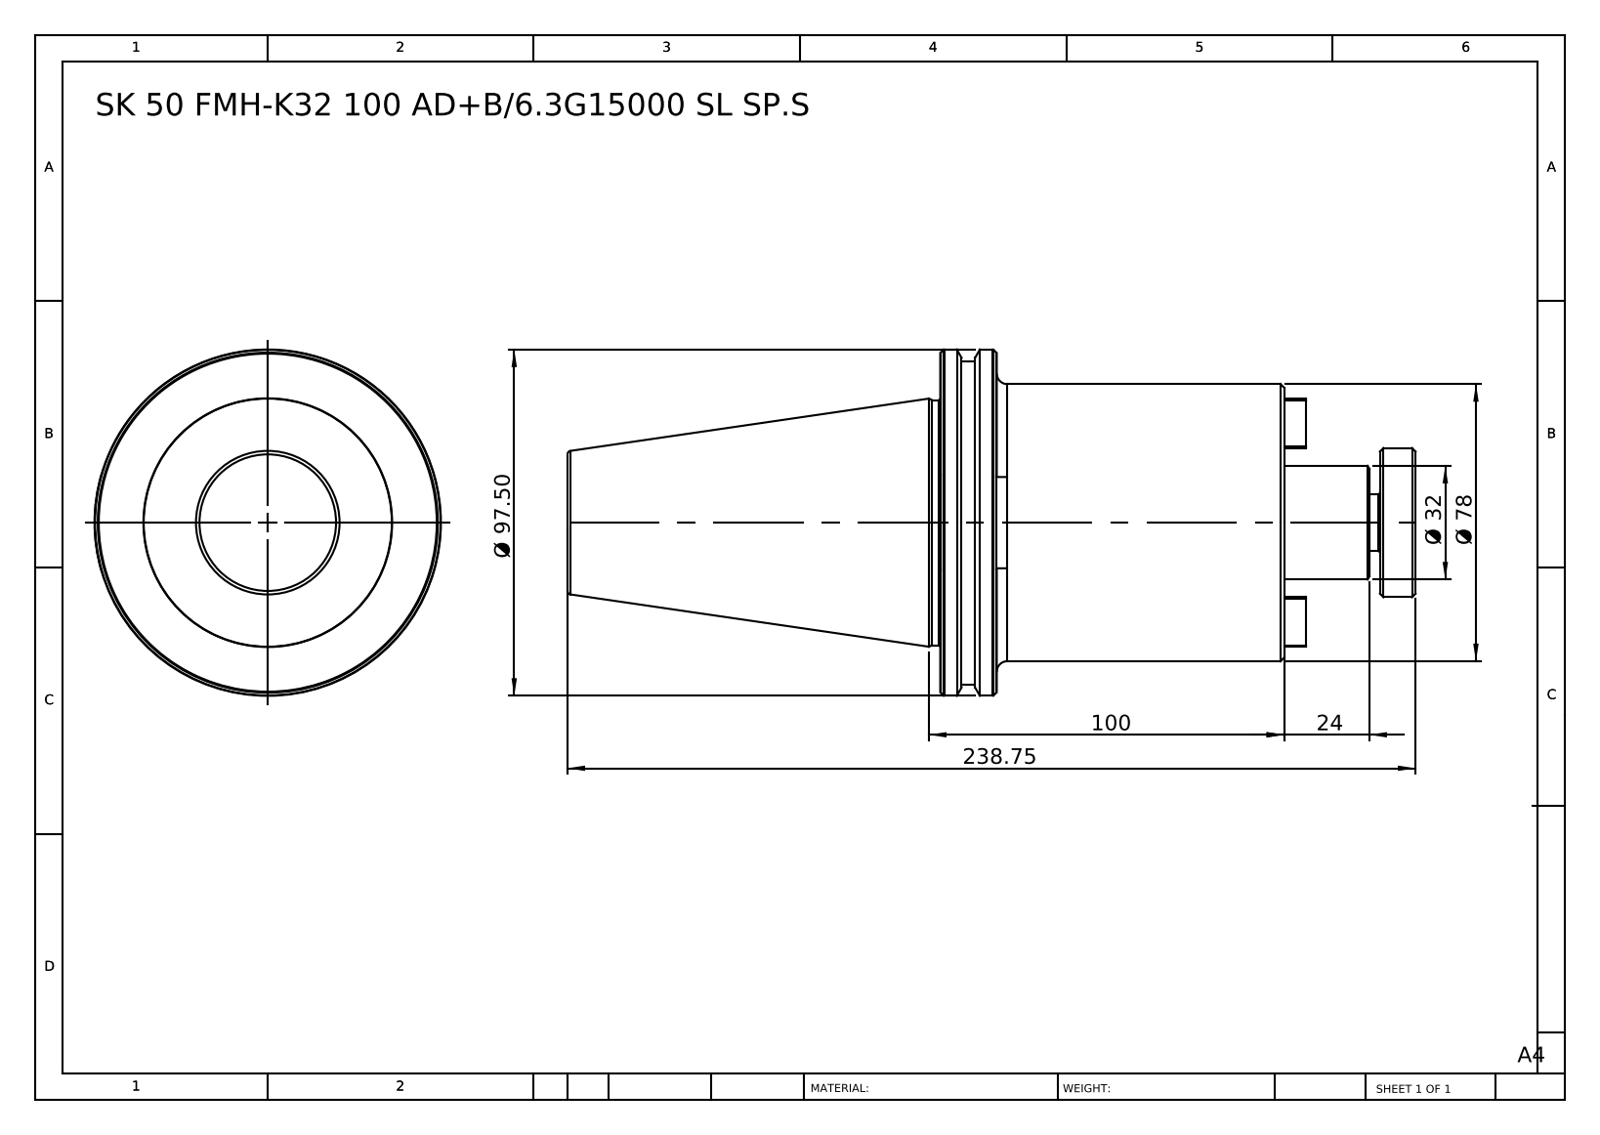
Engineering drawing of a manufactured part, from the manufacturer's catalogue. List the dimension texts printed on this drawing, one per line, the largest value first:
238.75
100
Ø 97.50
Ø 78
Ø 32
24
